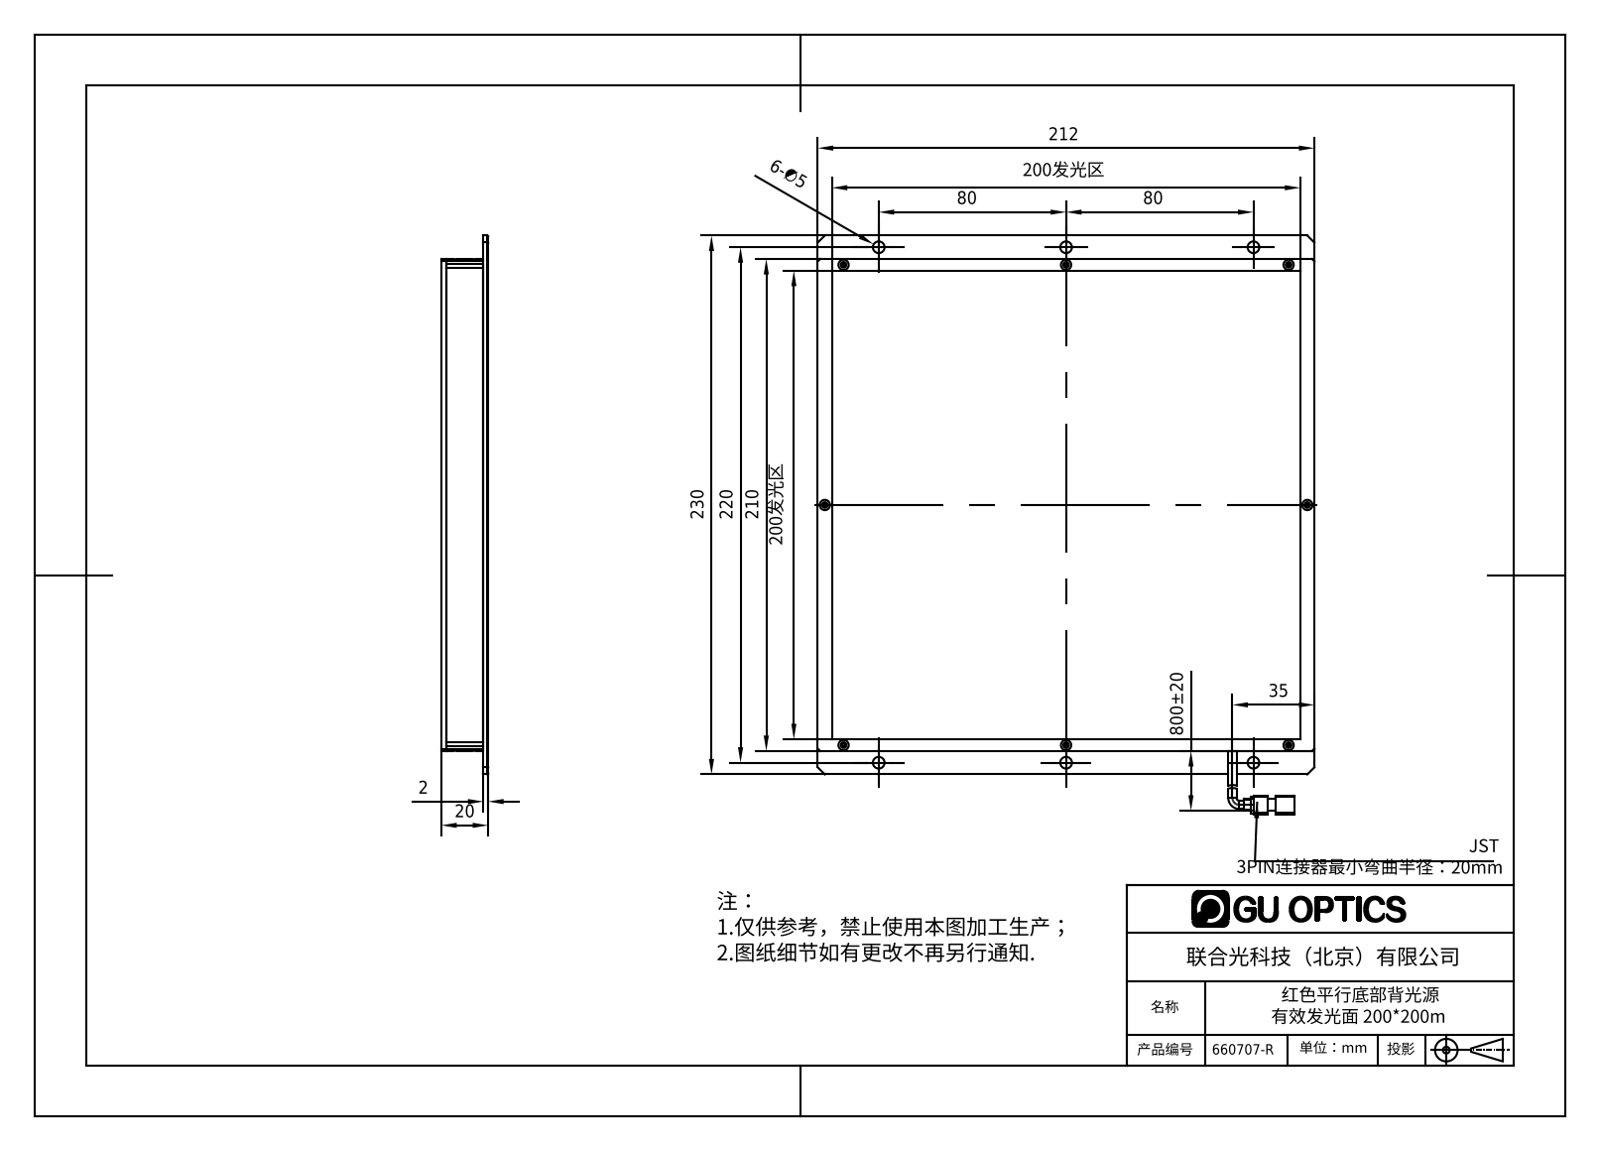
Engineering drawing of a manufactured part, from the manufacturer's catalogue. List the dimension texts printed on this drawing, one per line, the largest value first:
800±20
230
220
212
210
200发光区
200发光区
80
80
35
20
6-∅5
2
